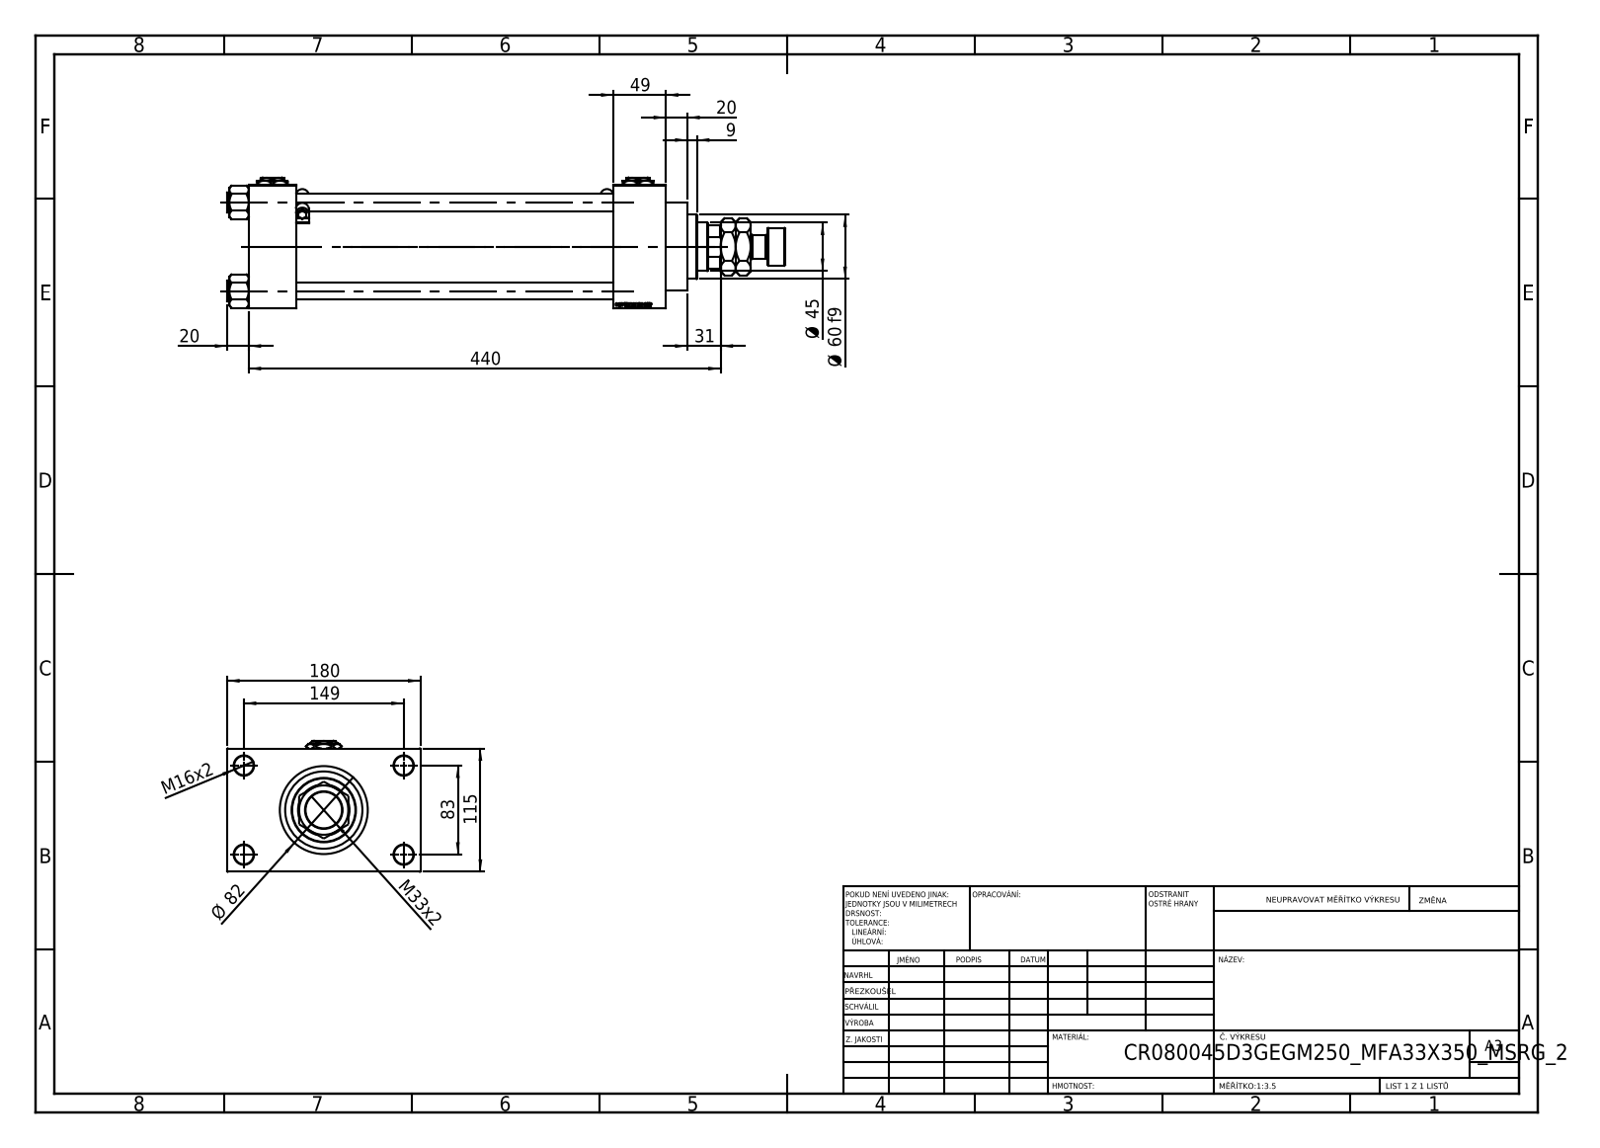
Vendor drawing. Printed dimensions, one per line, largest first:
440
180
149
115
83
Ø 82
Ø 60 f9
49
Ø 45
M33x2
31
20
20
M16x2
9
